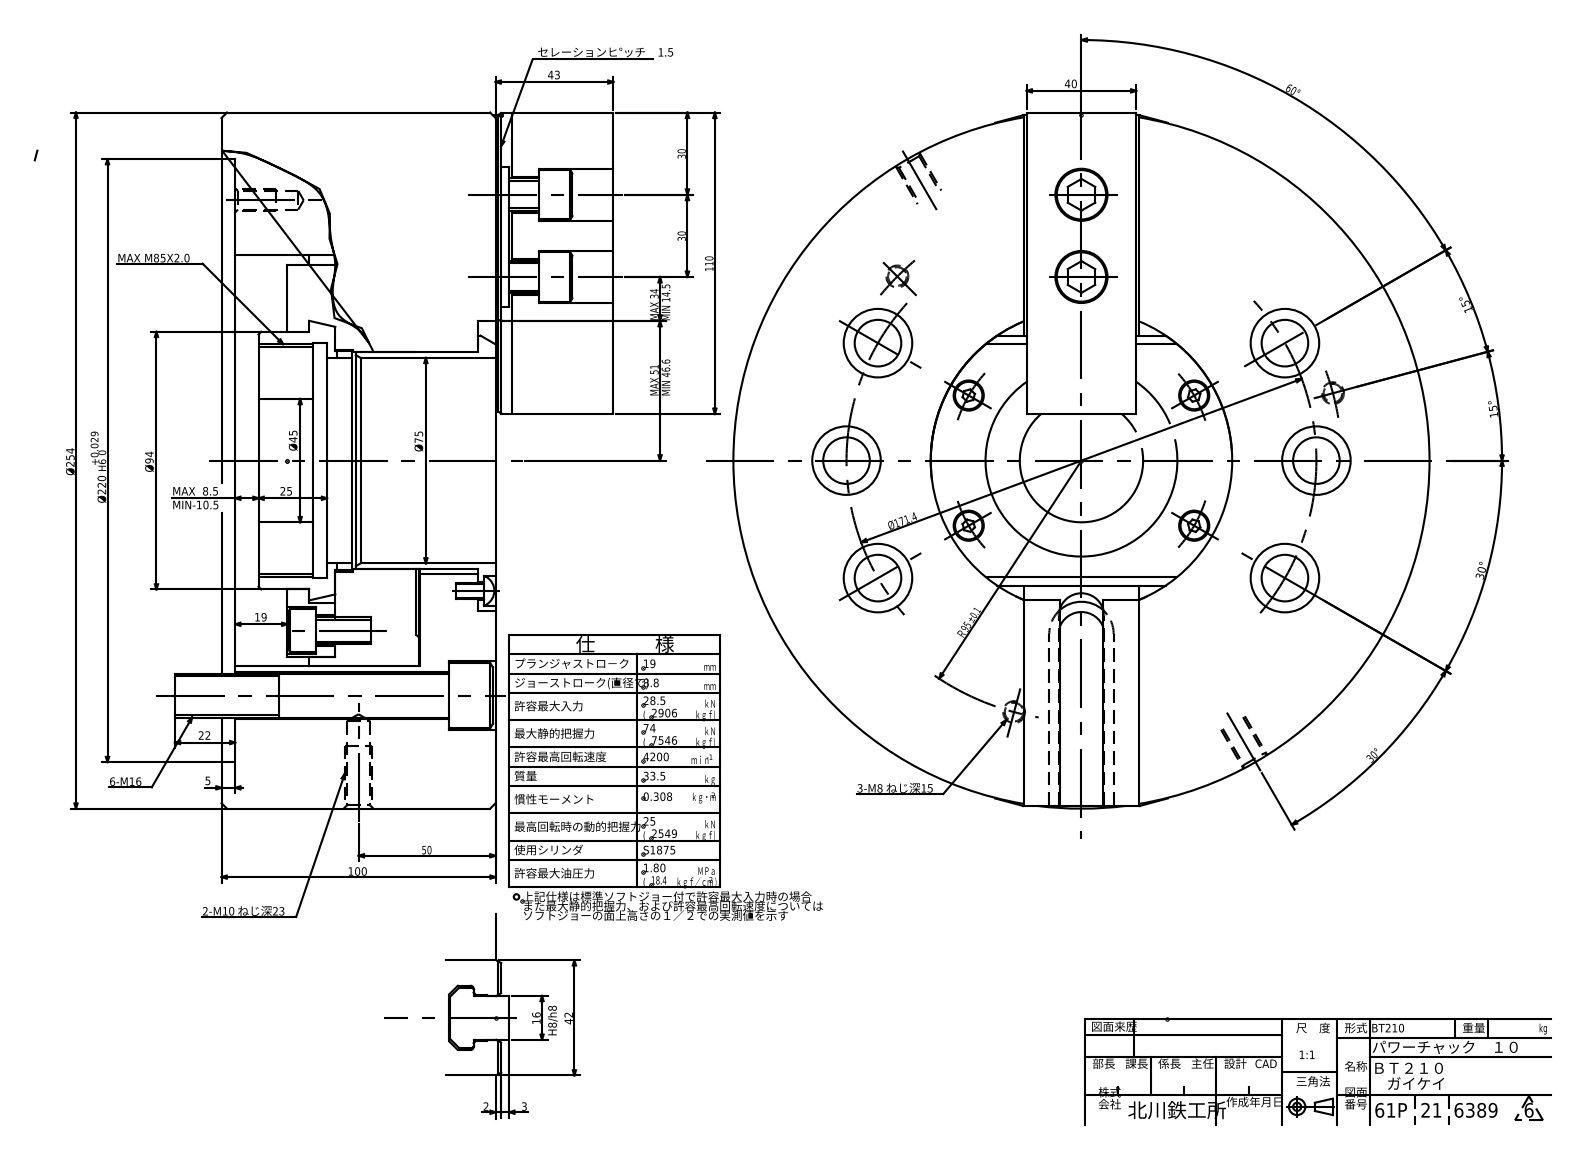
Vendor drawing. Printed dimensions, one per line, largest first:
Ø254
Ø220 +0.029 H6 0
Ø171.4
110
100
Ｒ95 ±0.1
Ø94
Ø75
60°
MAX 51
50
Ø45
43
42
40
MAX 34
30°
30°
30
30
25
22
19
16
15°
15°
MAX 8.5
5
3
2
